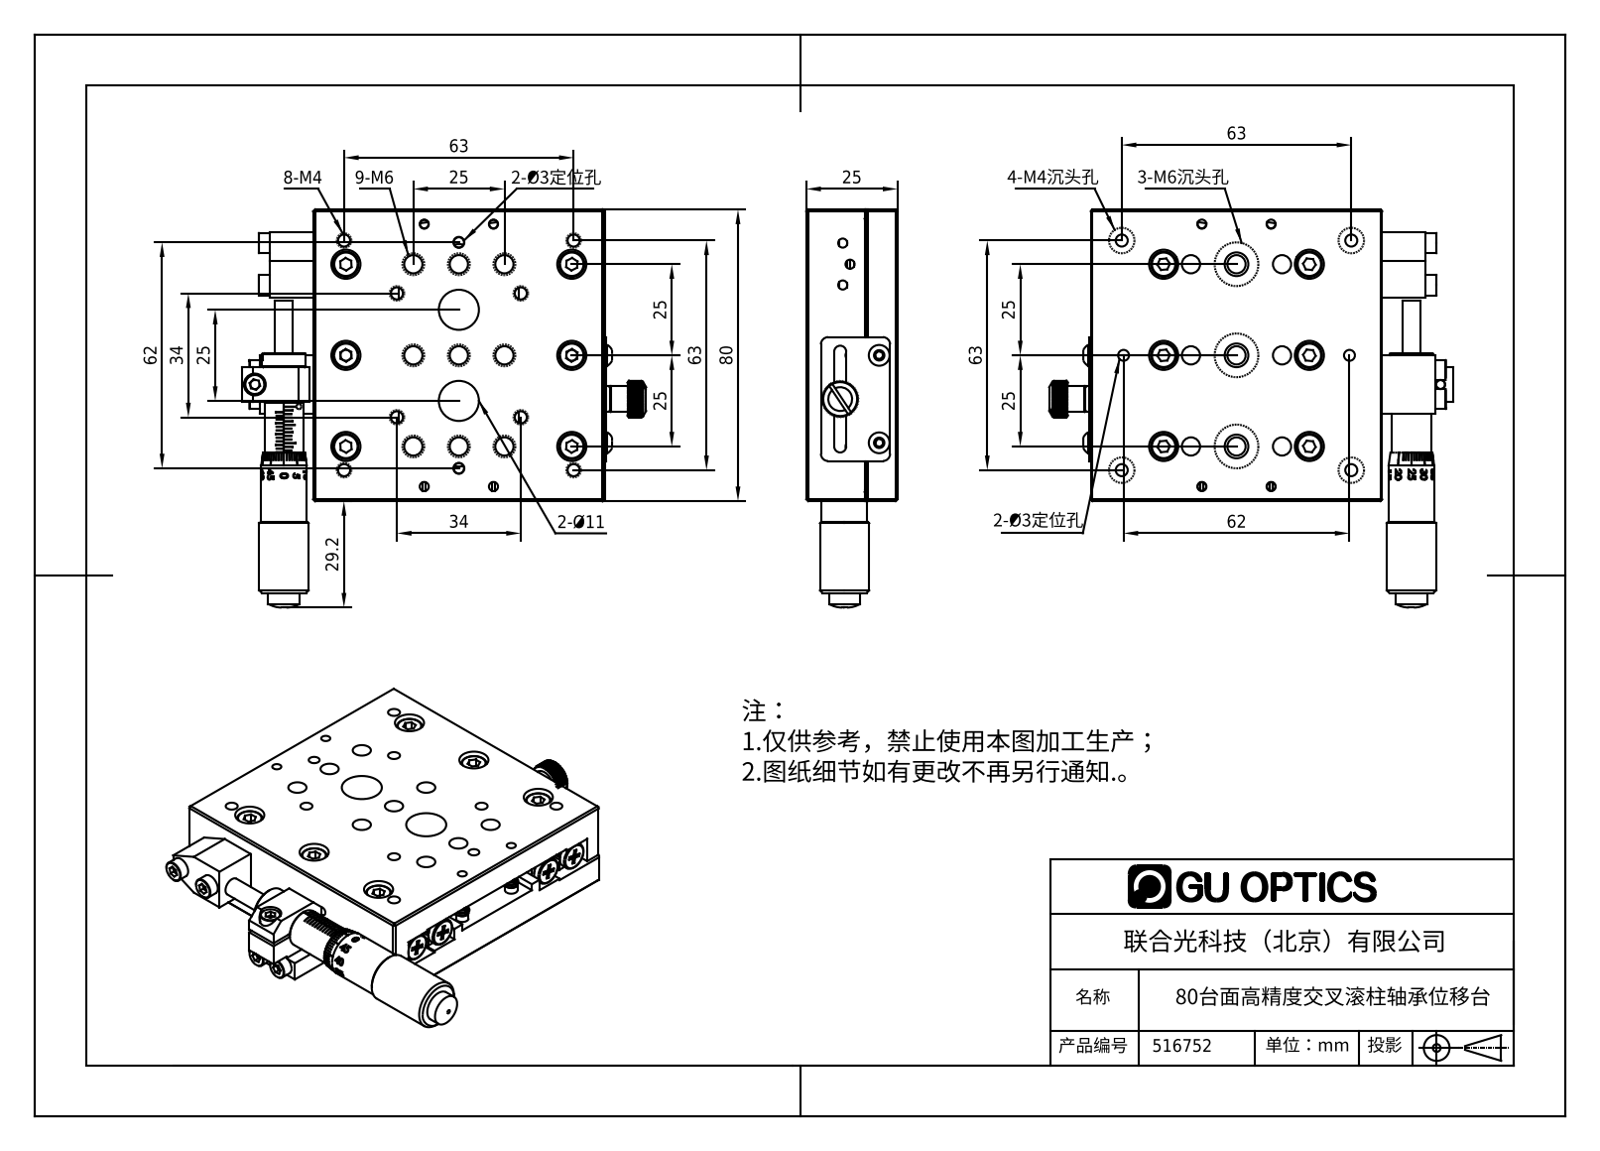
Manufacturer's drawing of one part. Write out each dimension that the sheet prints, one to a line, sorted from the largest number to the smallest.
80
63
63
63
63
62
62
34
34
29.2
25
25
25
25
25
25
25
